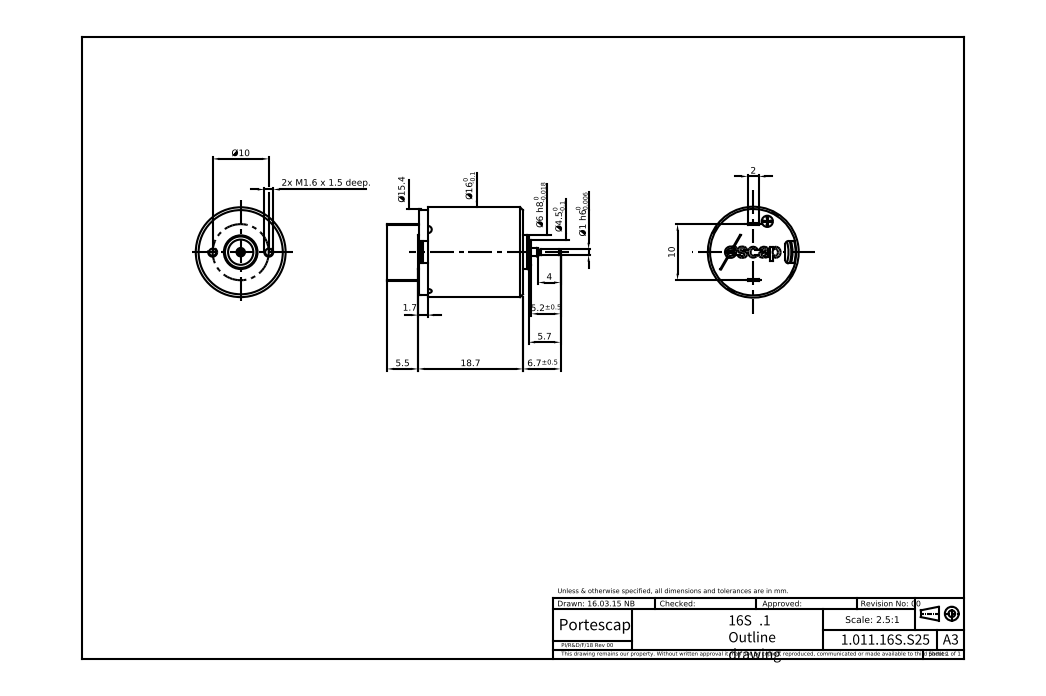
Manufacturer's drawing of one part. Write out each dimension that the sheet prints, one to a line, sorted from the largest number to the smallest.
18.7
10
Ø10
6.7±0.5
5.7
5.5
5.2±0.5
4
2
1.7
2x M1.6 x 1.5 deep.
Ø1 h6
